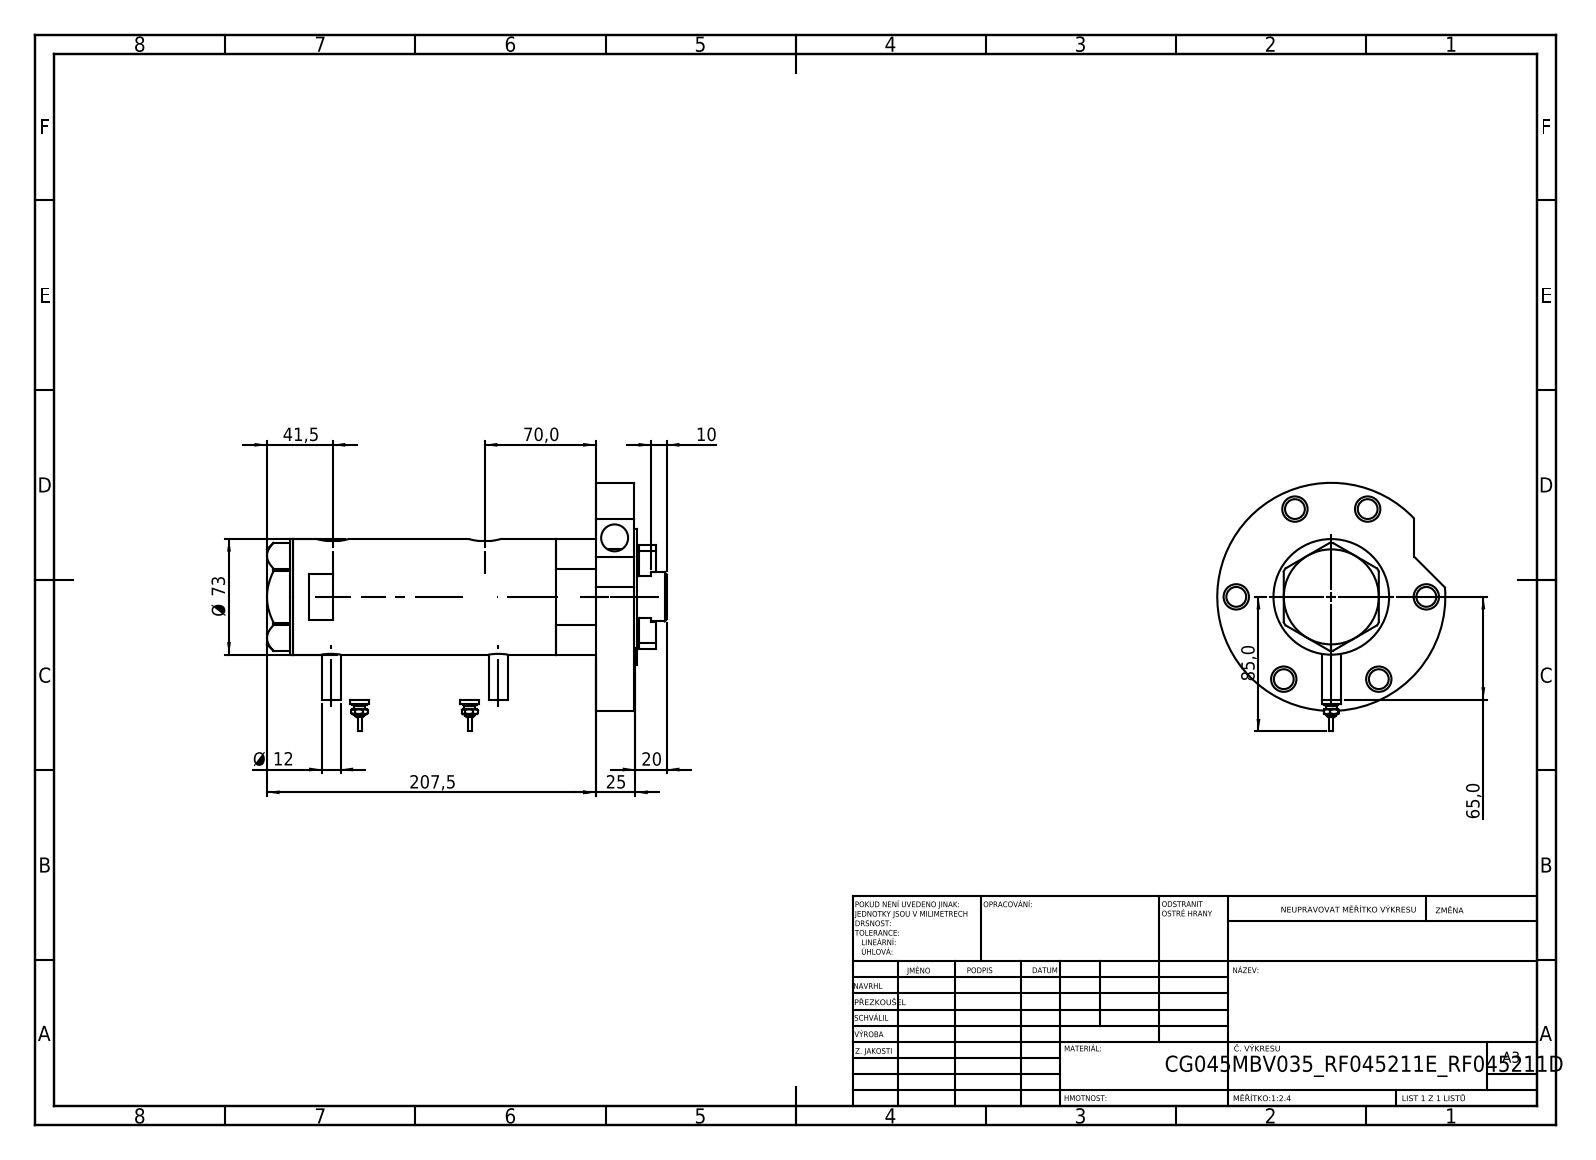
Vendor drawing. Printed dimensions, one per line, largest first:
207,5
85,0
Ø 73
70,0
65,0
41,5
25
20
Ø 12
10
